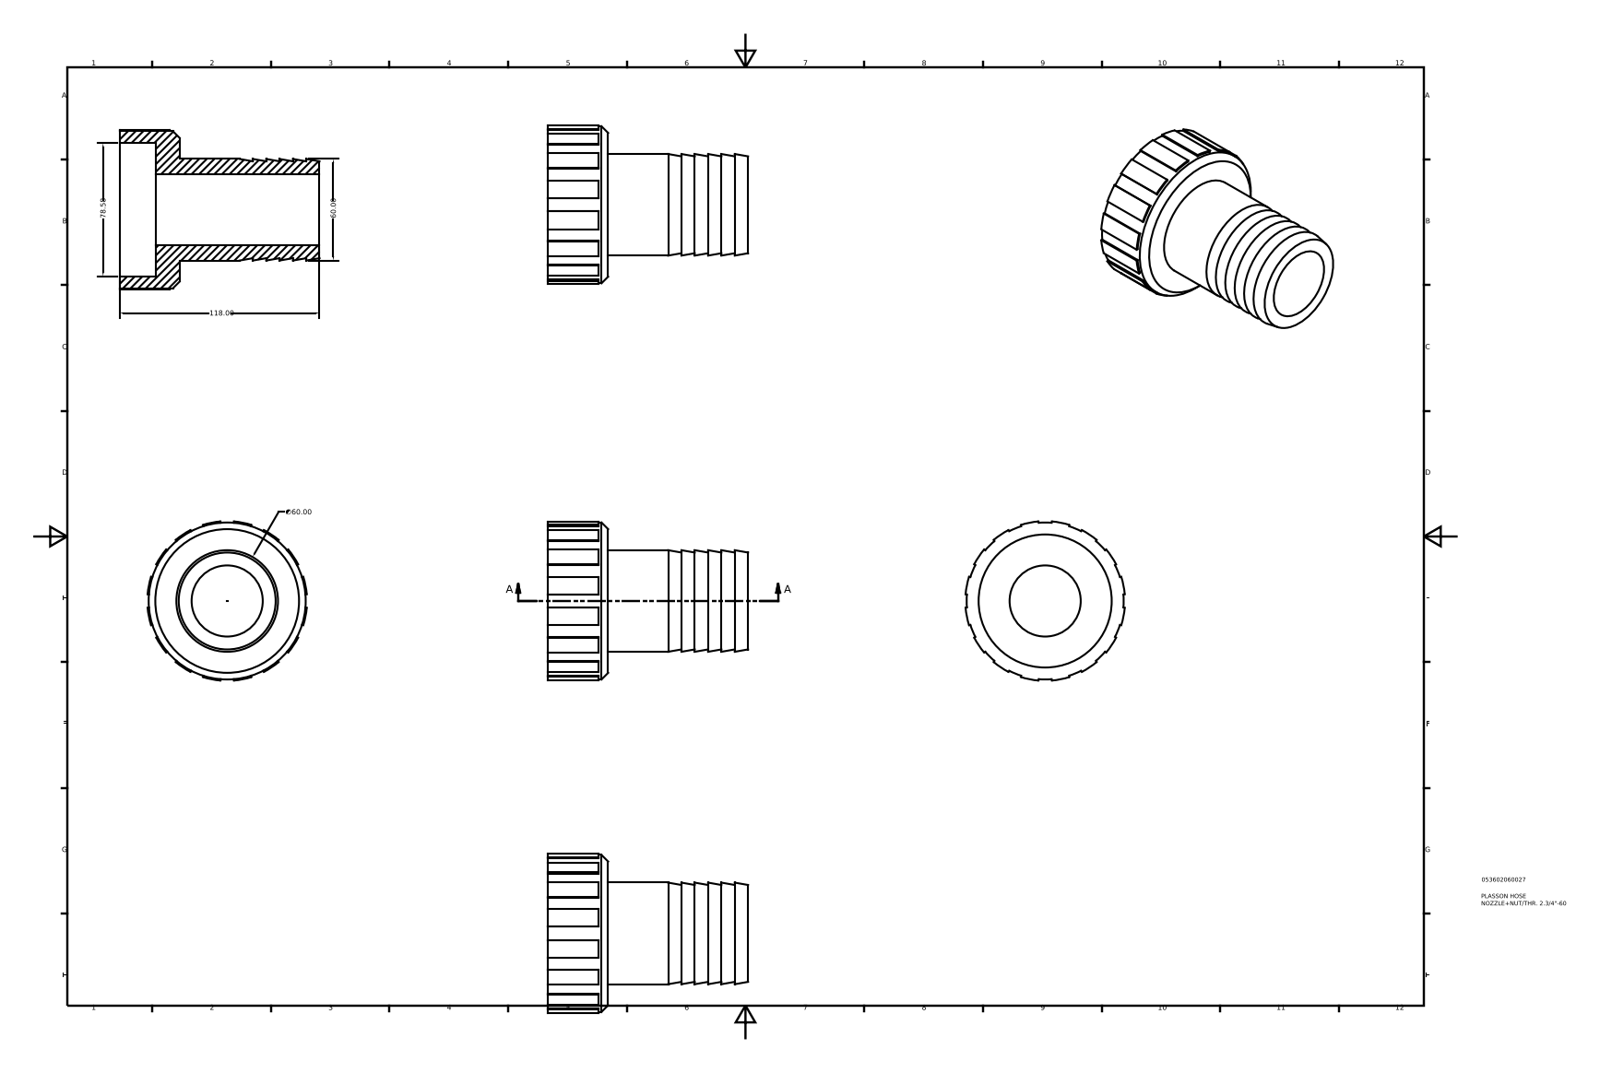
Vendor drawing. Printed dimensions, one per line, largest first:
118.00
78.58
60.00
∅60.00
